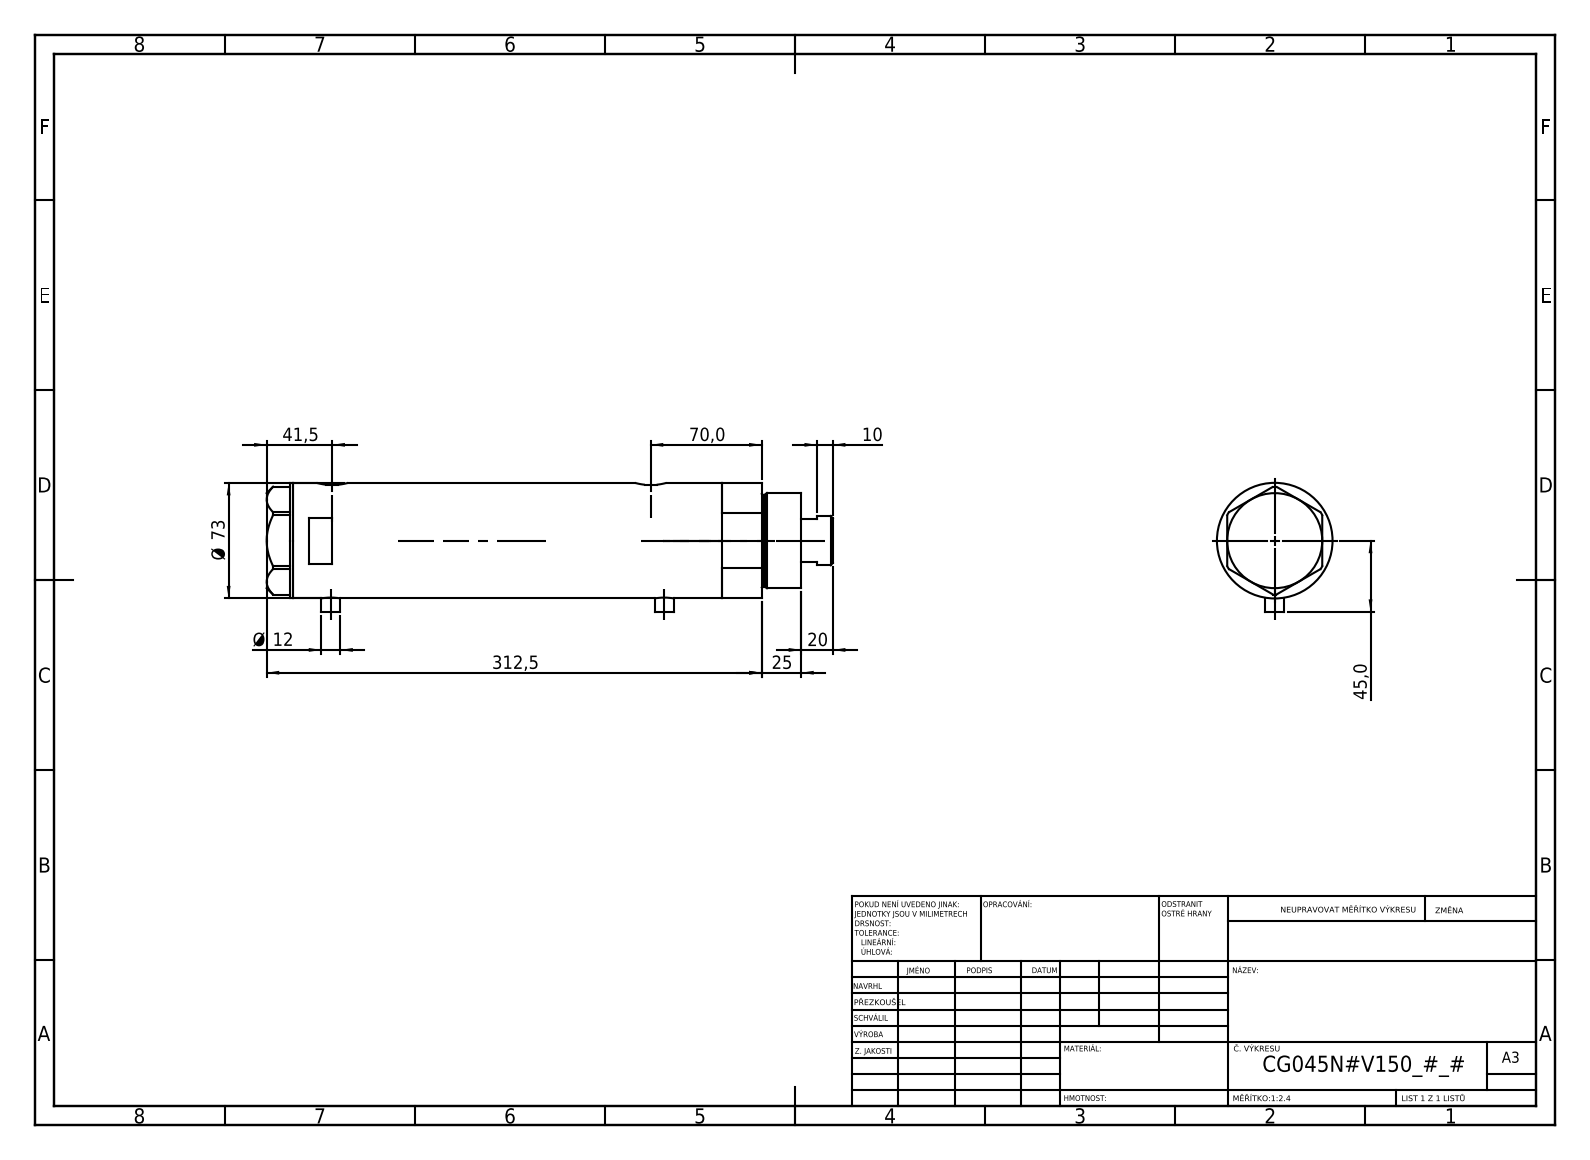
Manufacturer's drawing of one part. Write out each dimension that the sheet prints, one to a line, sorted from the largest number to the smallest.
312,5
Ø 73
70,0
45,0
41,5
25
20
Ø 12
10
